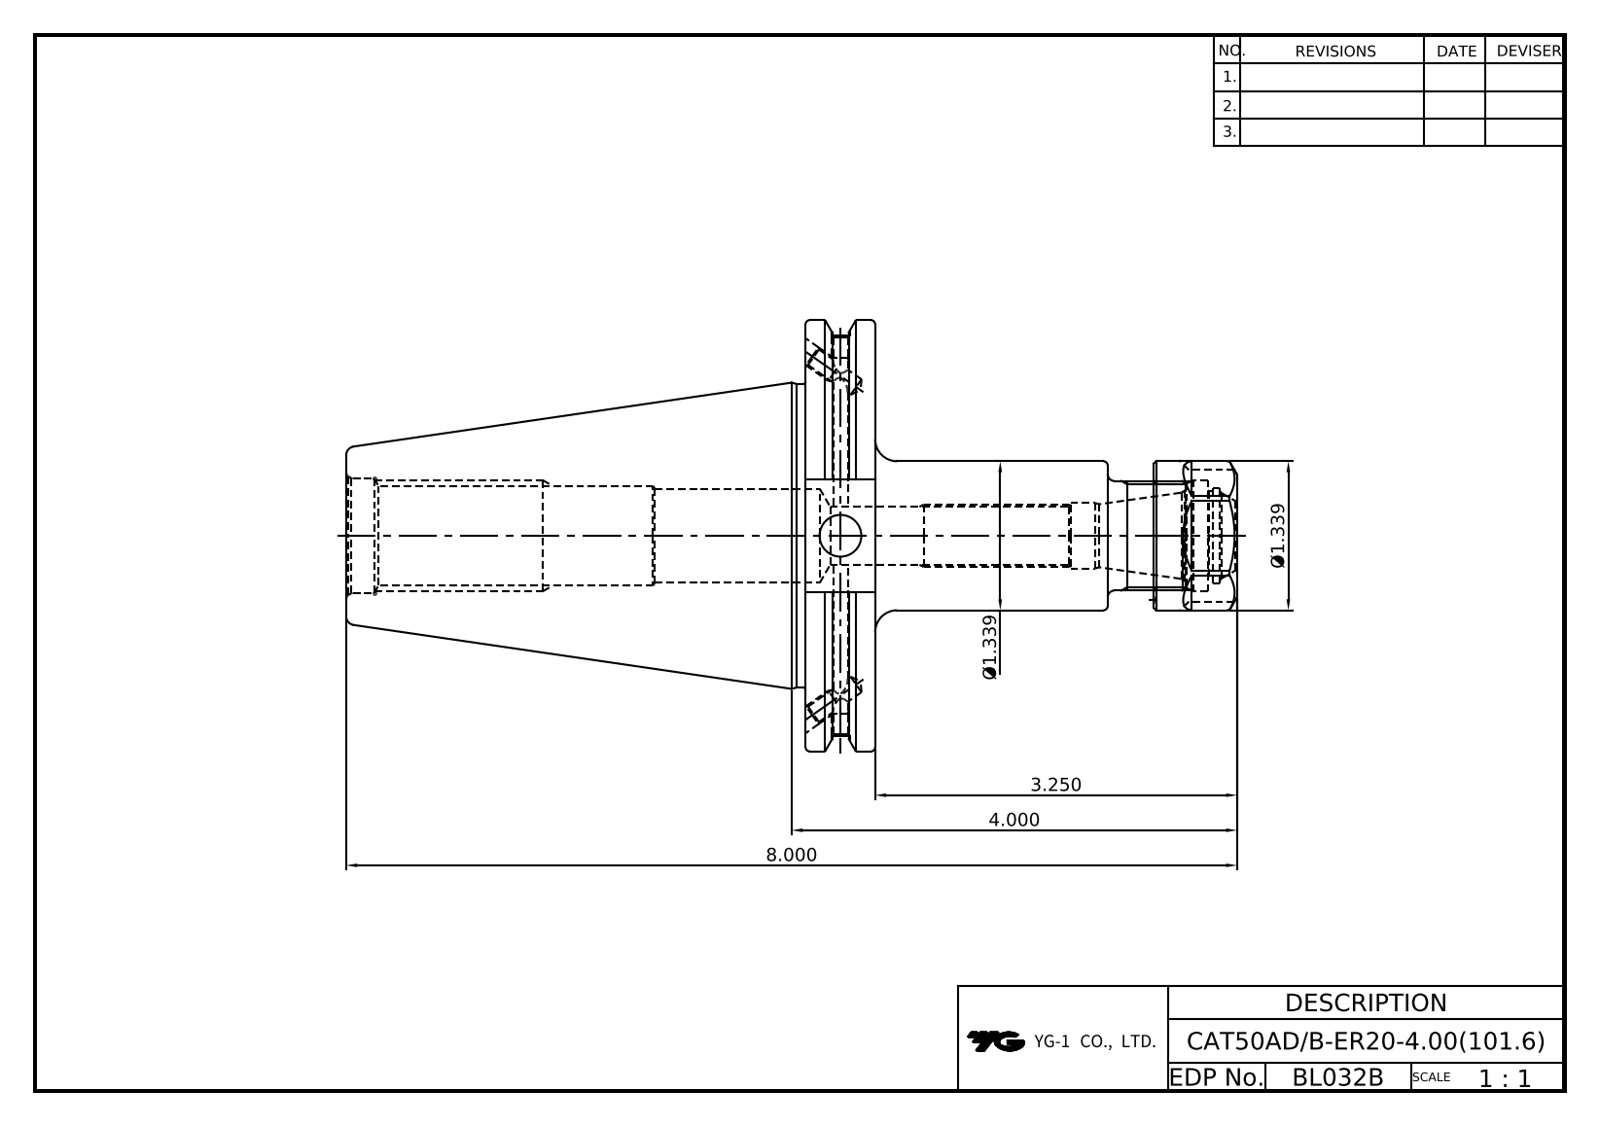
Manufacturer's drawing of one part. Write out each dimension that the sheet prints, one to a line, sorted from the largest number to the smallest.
8.000
4.000
3.250
Ø1.339
Ø1.339
